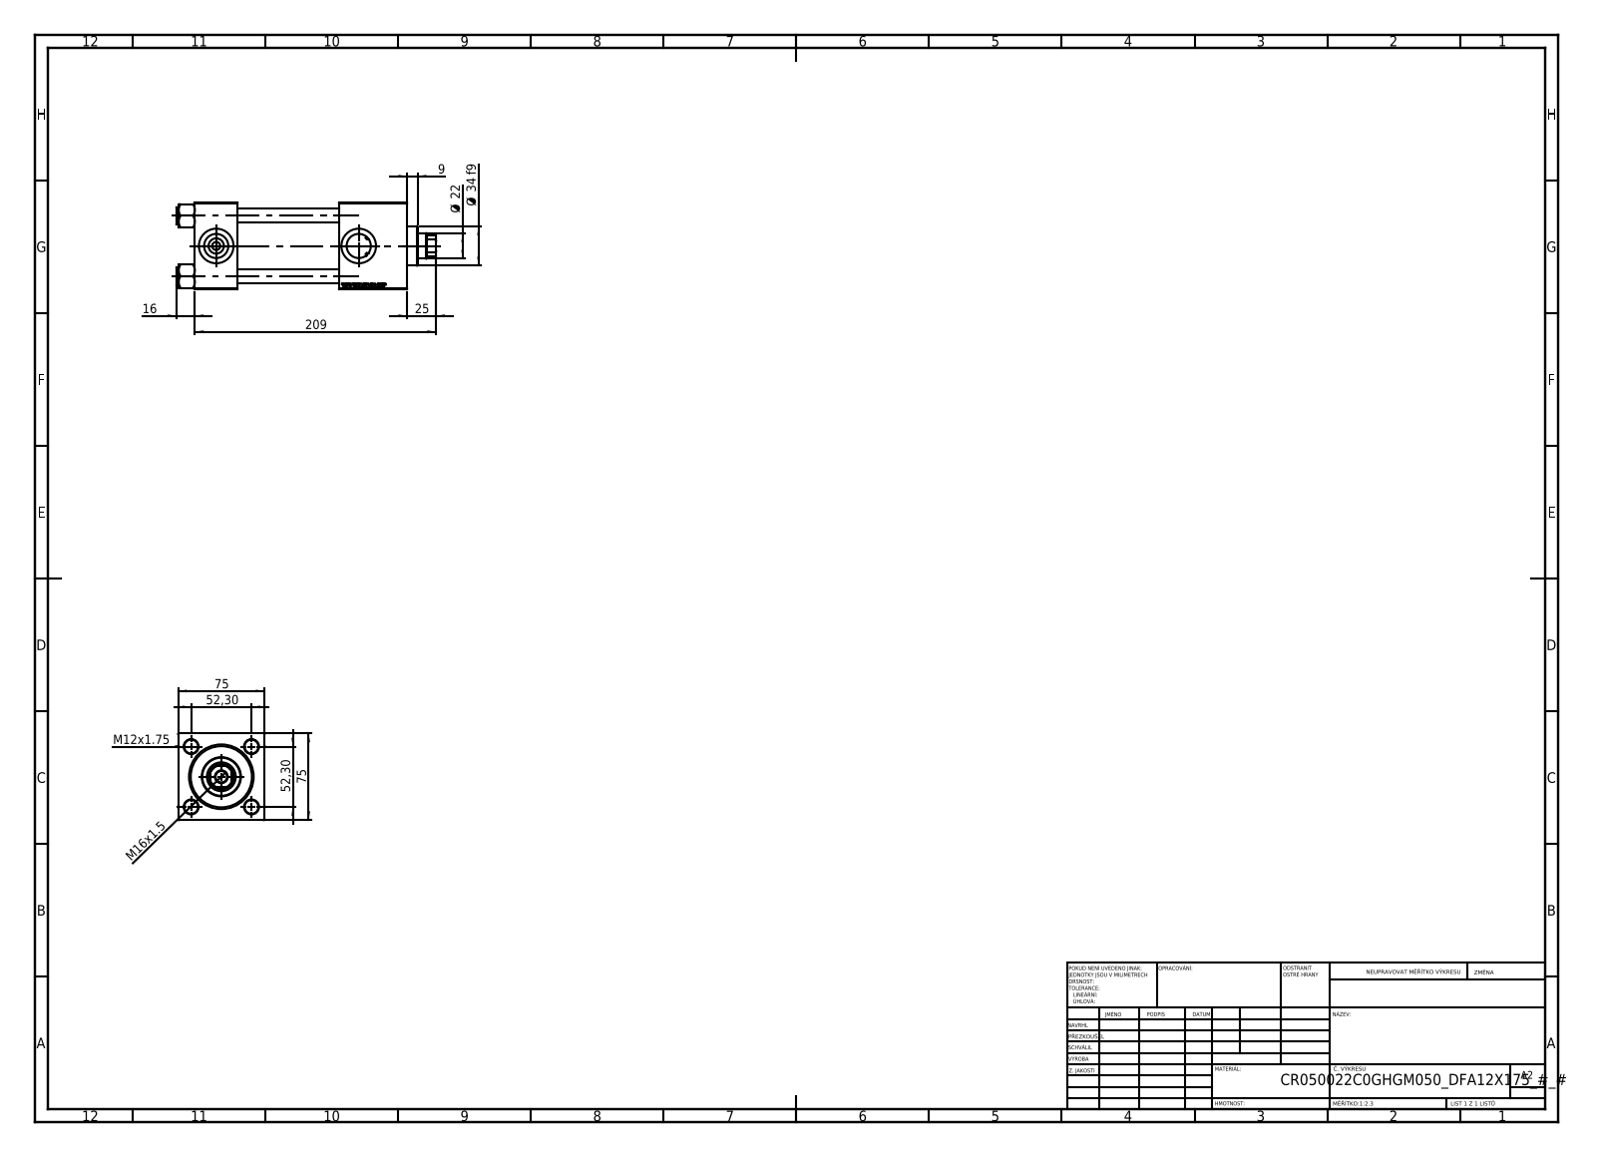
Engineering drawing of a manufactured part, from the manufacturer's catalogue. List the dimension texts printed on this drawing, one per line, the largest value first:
209
75
75
52,30
52,30
Ø 34 f9
25
Ø 22
16
M16x1.5
M12x1.75
9
